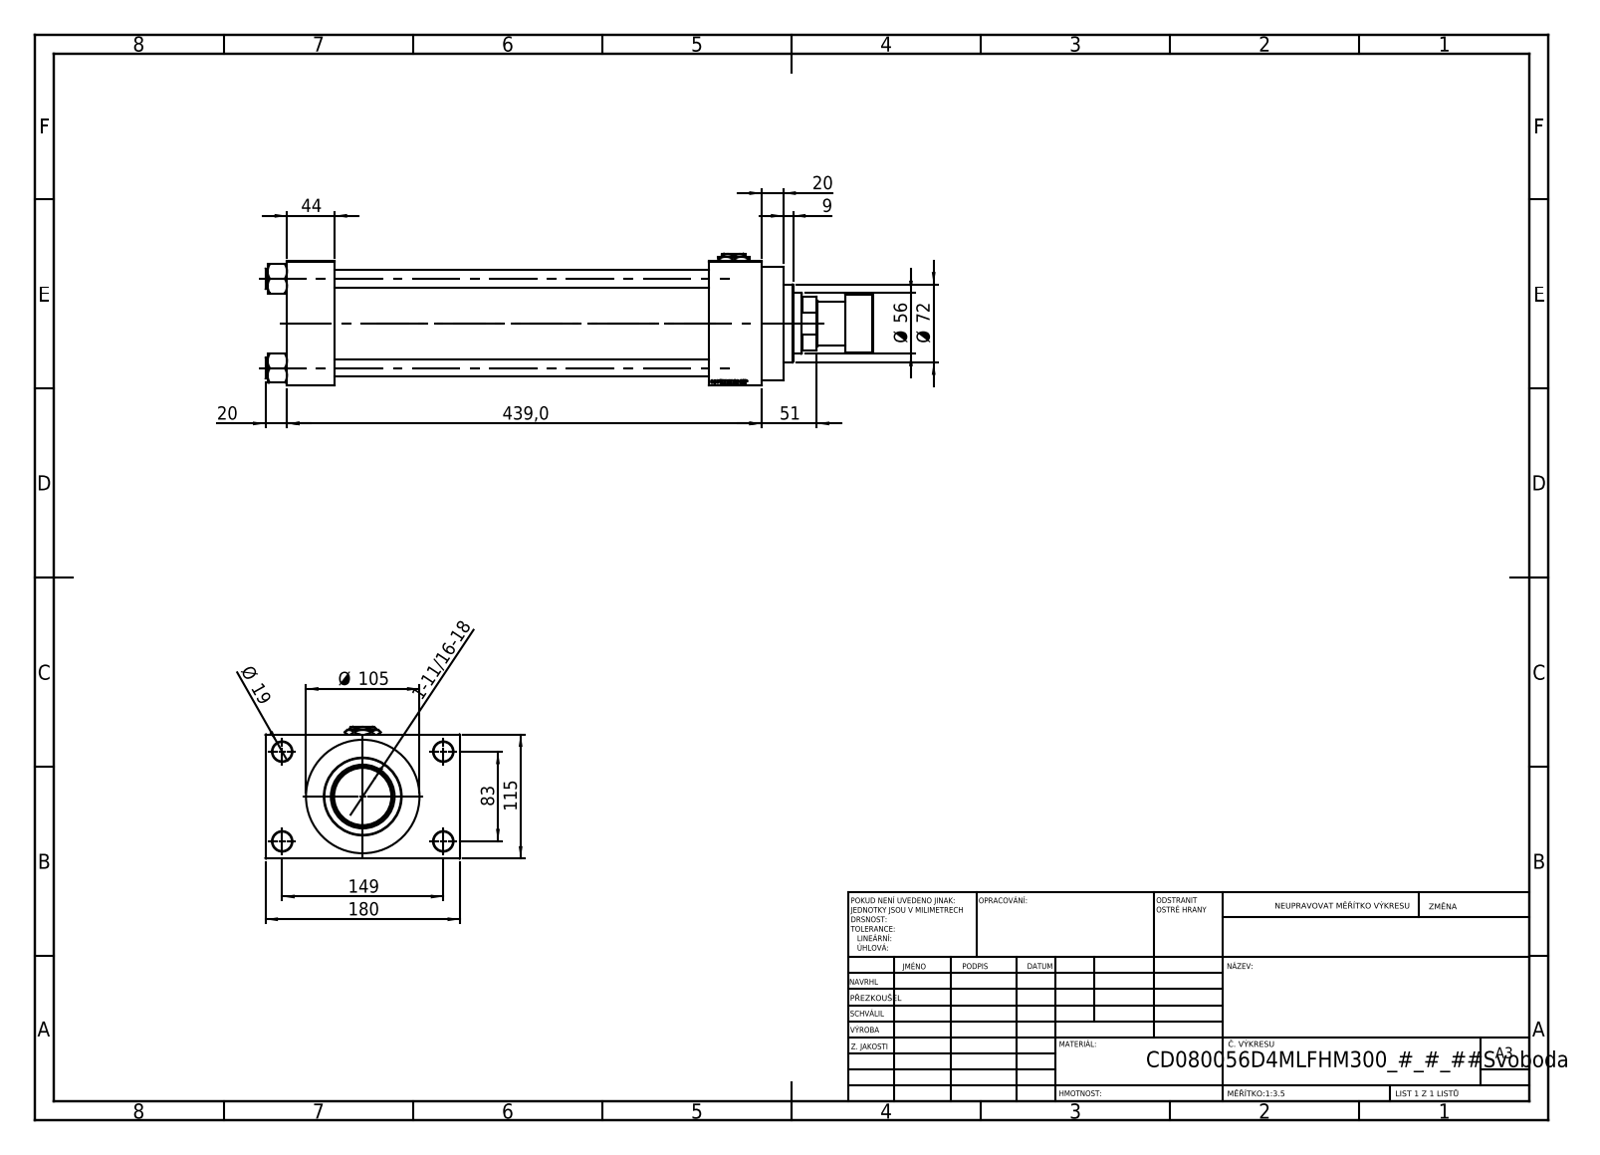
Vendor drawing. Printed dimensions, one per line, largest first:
439,0
180
149
115
Ø 105
83
Ø 72
Ø 56
51
44
20
20
Ø 19
9
1-11/16-18
